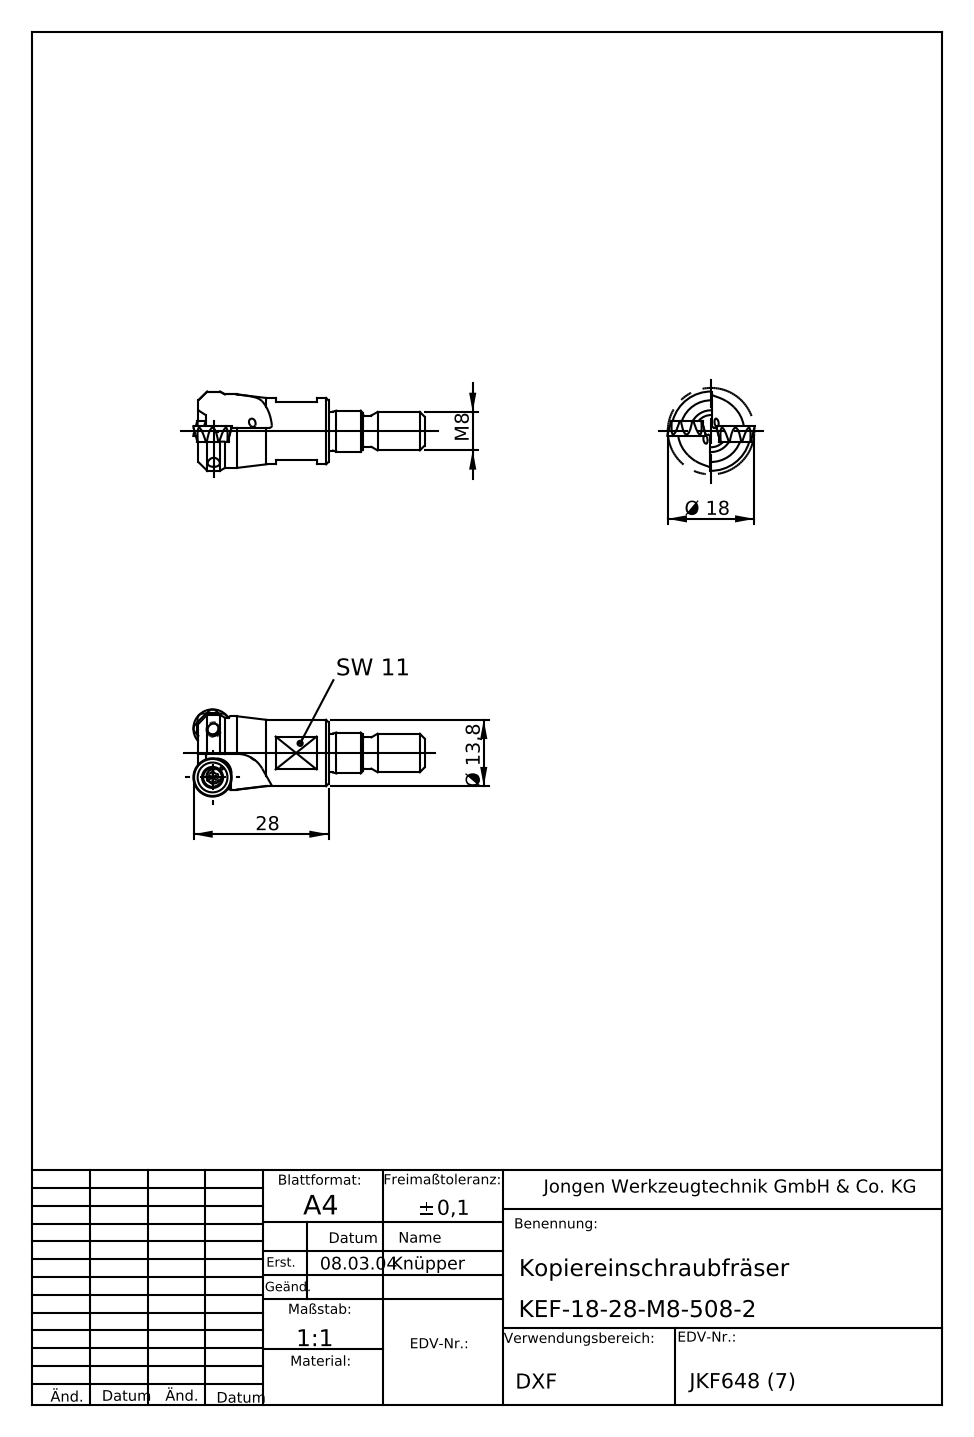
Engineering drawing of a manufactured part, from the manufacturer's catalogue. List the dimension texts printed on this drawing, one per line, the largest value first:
28
Ø 18
Ø 13,8
M 8
